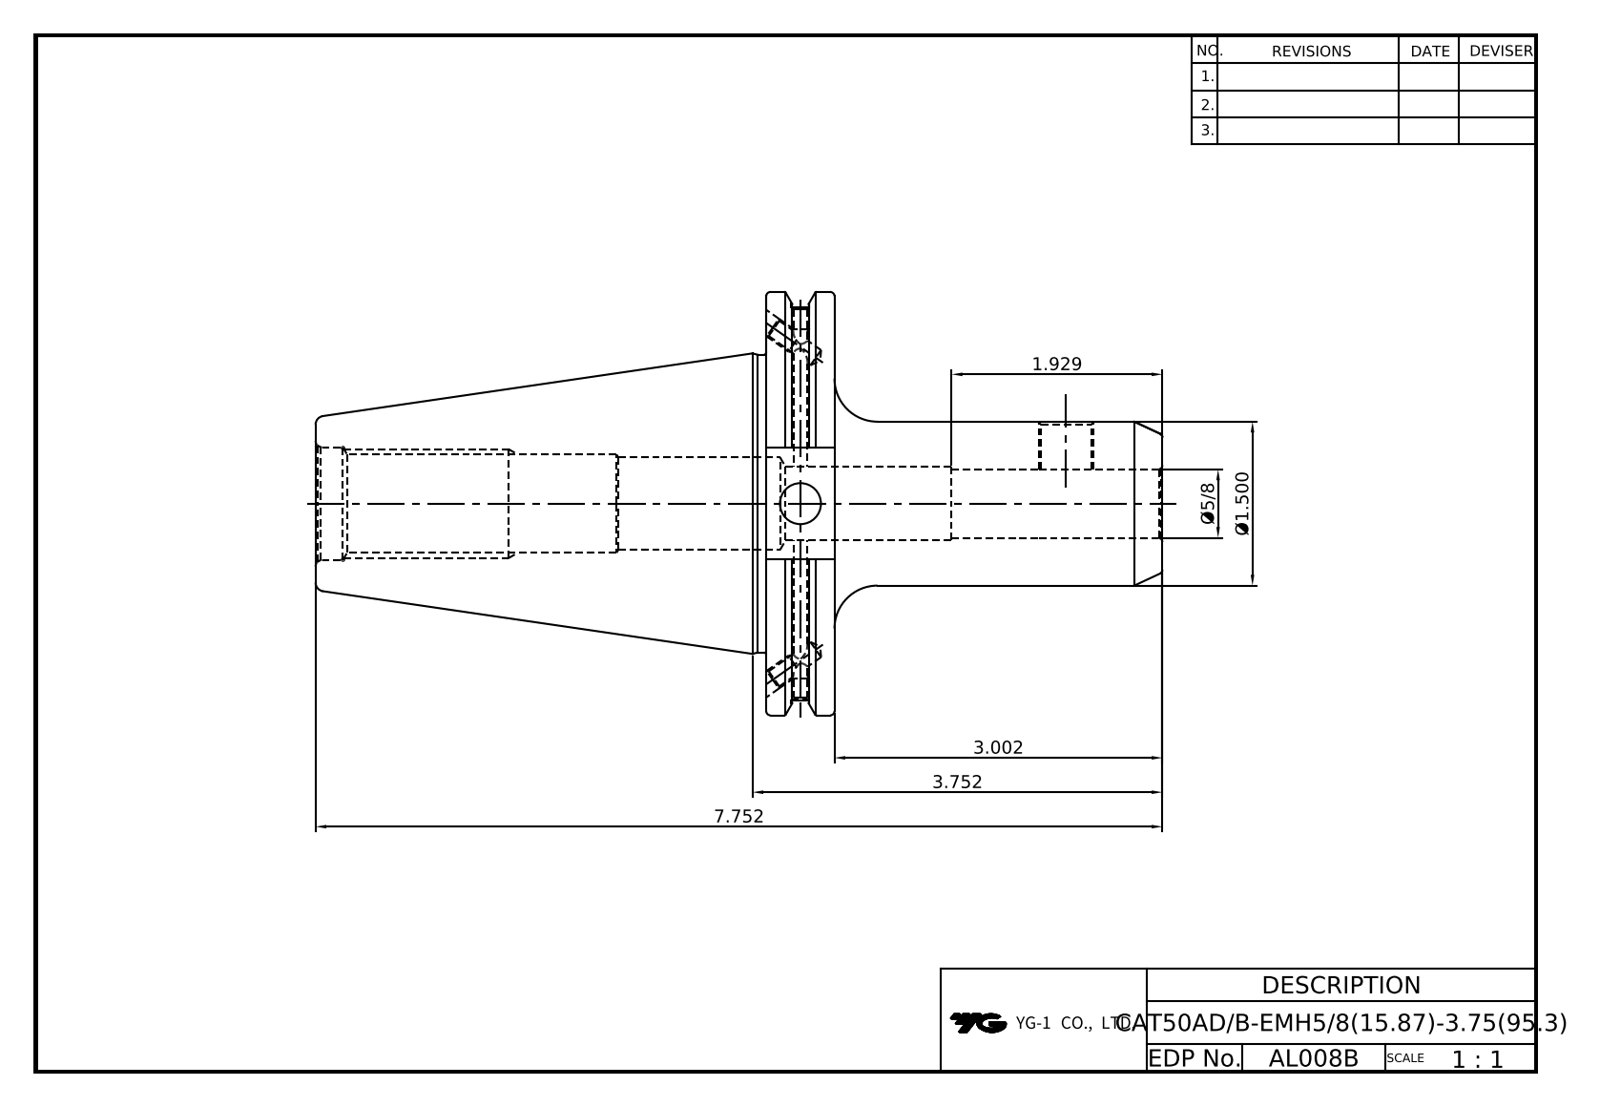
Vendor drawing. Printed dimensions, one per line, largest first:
7.752
3.752
3.002
1.929
Ø1.500
Ø5/8
